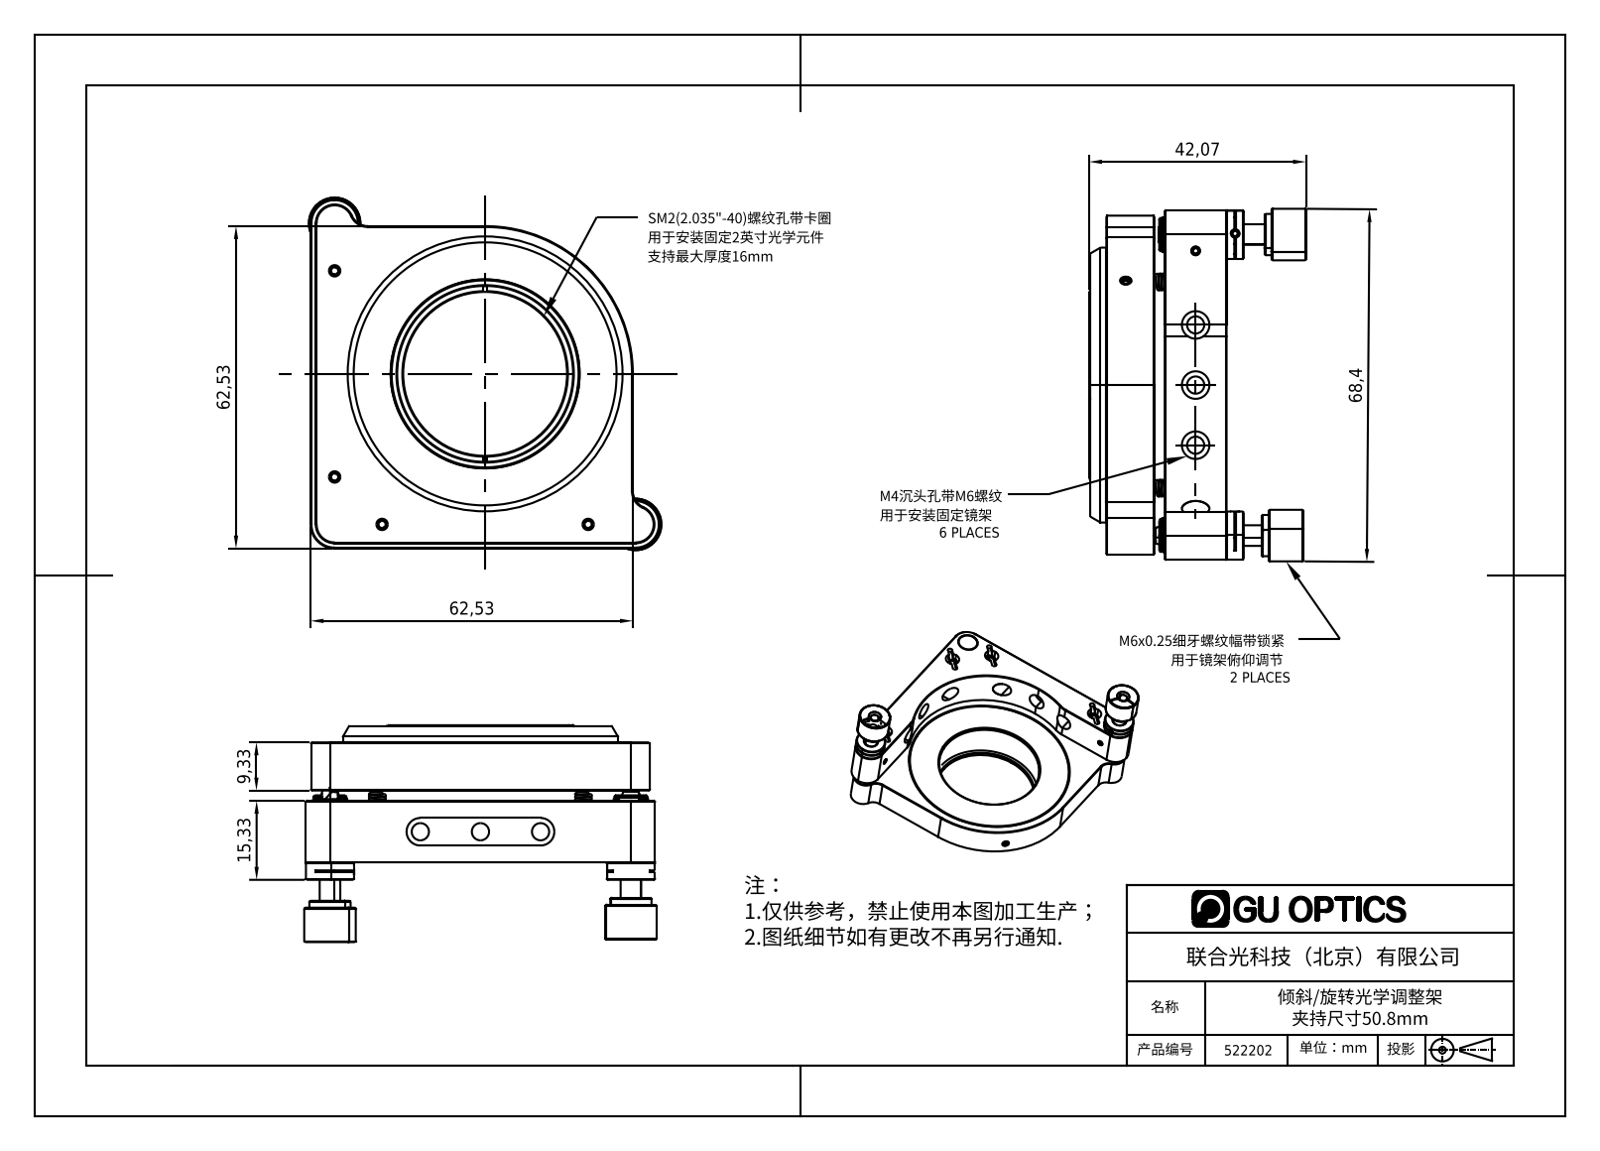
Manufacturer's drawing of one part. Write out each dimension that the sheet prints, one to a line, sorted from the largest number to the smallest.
68,4
62,53
62,53
42,07
15,33
9,33
